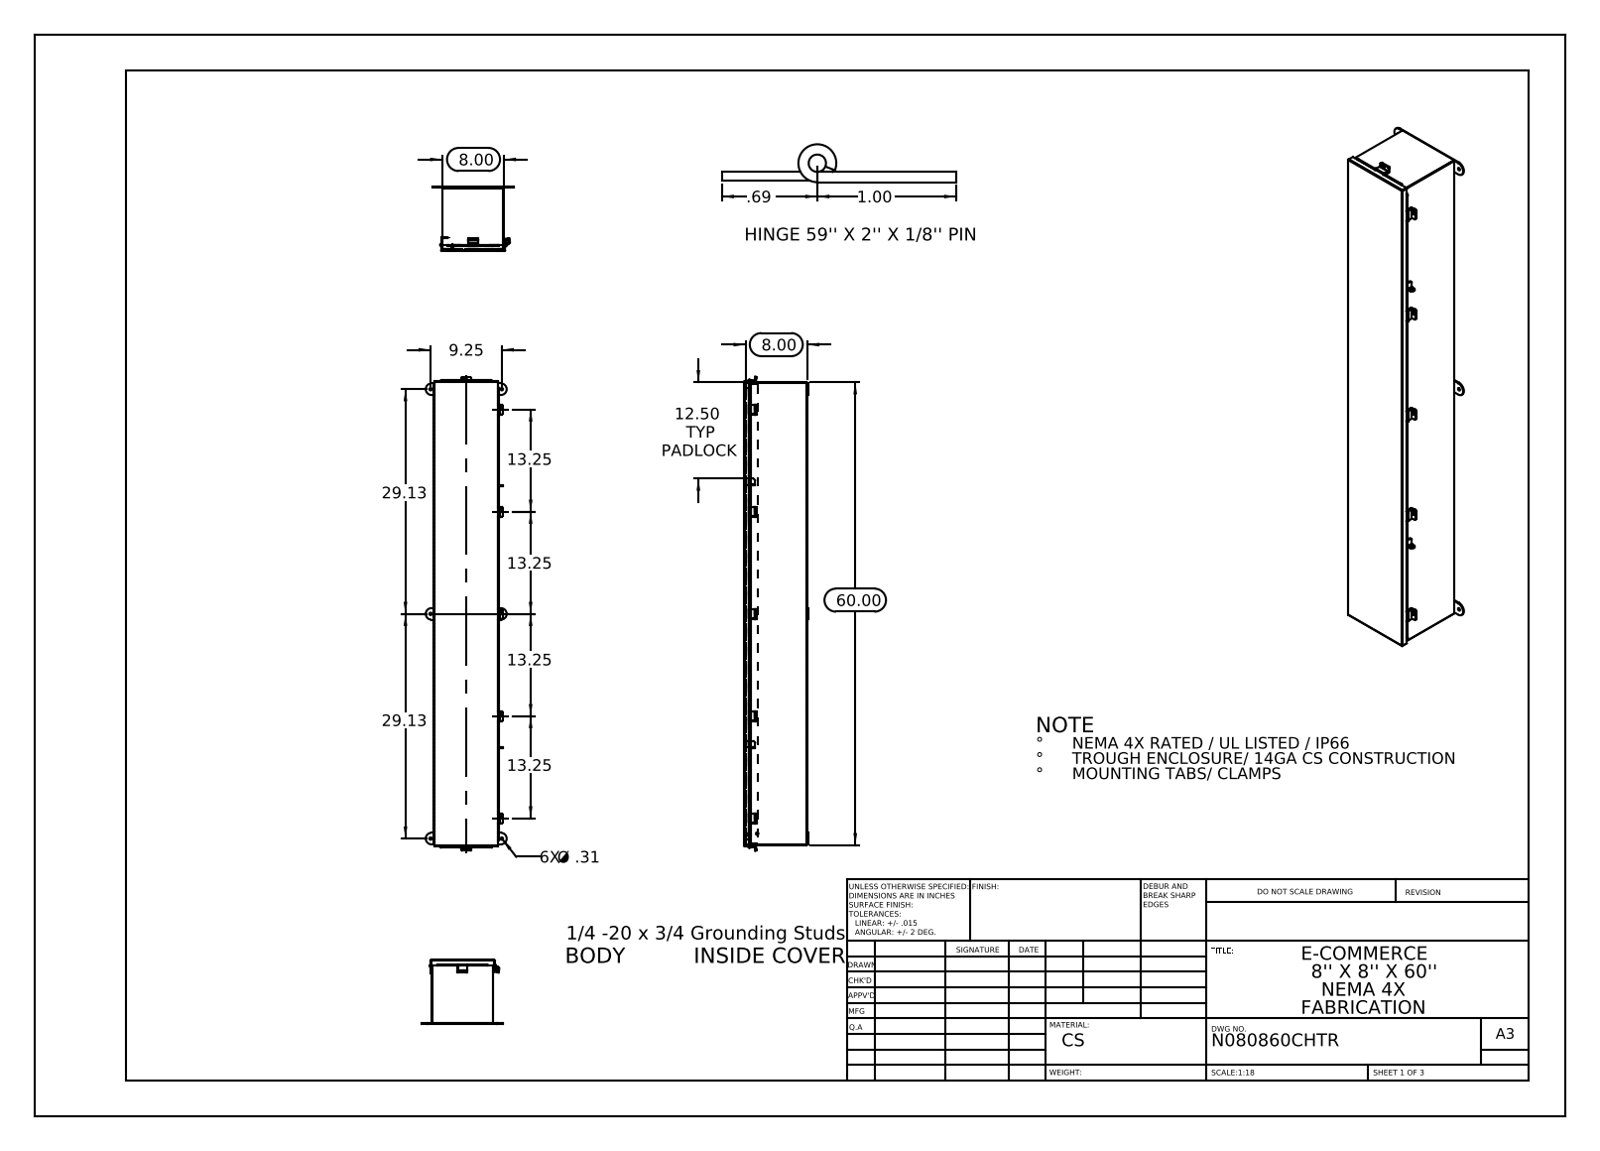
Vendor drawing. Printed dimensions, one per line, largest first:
60.00
29.13
29.13
13.25
13.25
13.25
13.25
12.50 TYP PADLOCK
9.25
8.00
8.00
1.00
.69
6X Ø .31
